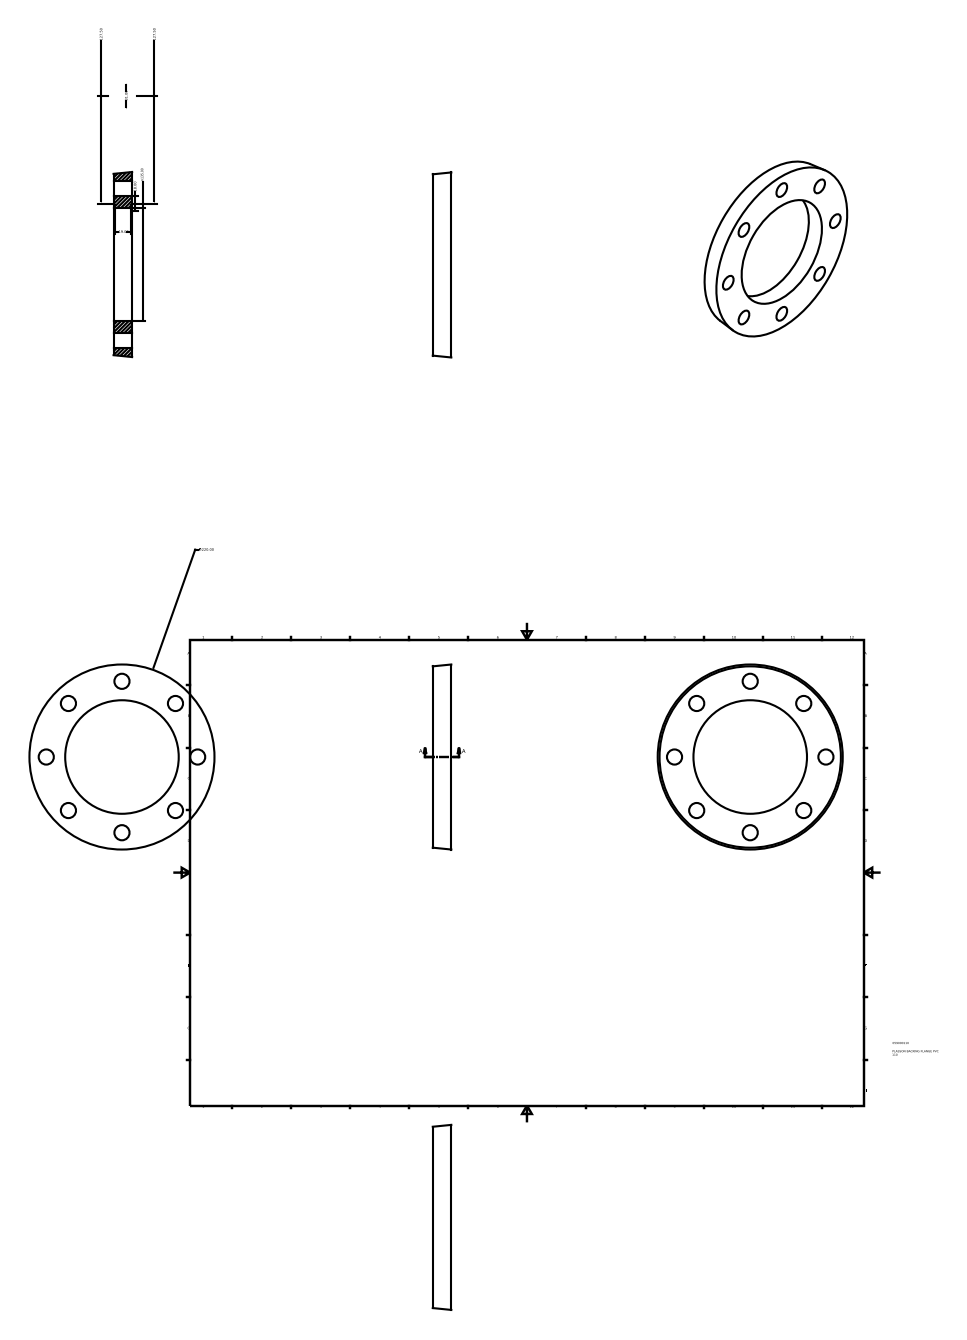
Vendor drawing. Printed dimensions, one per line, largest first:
∅220.00
n135.00
127.50
127.50
31.00
19.00
18.00
